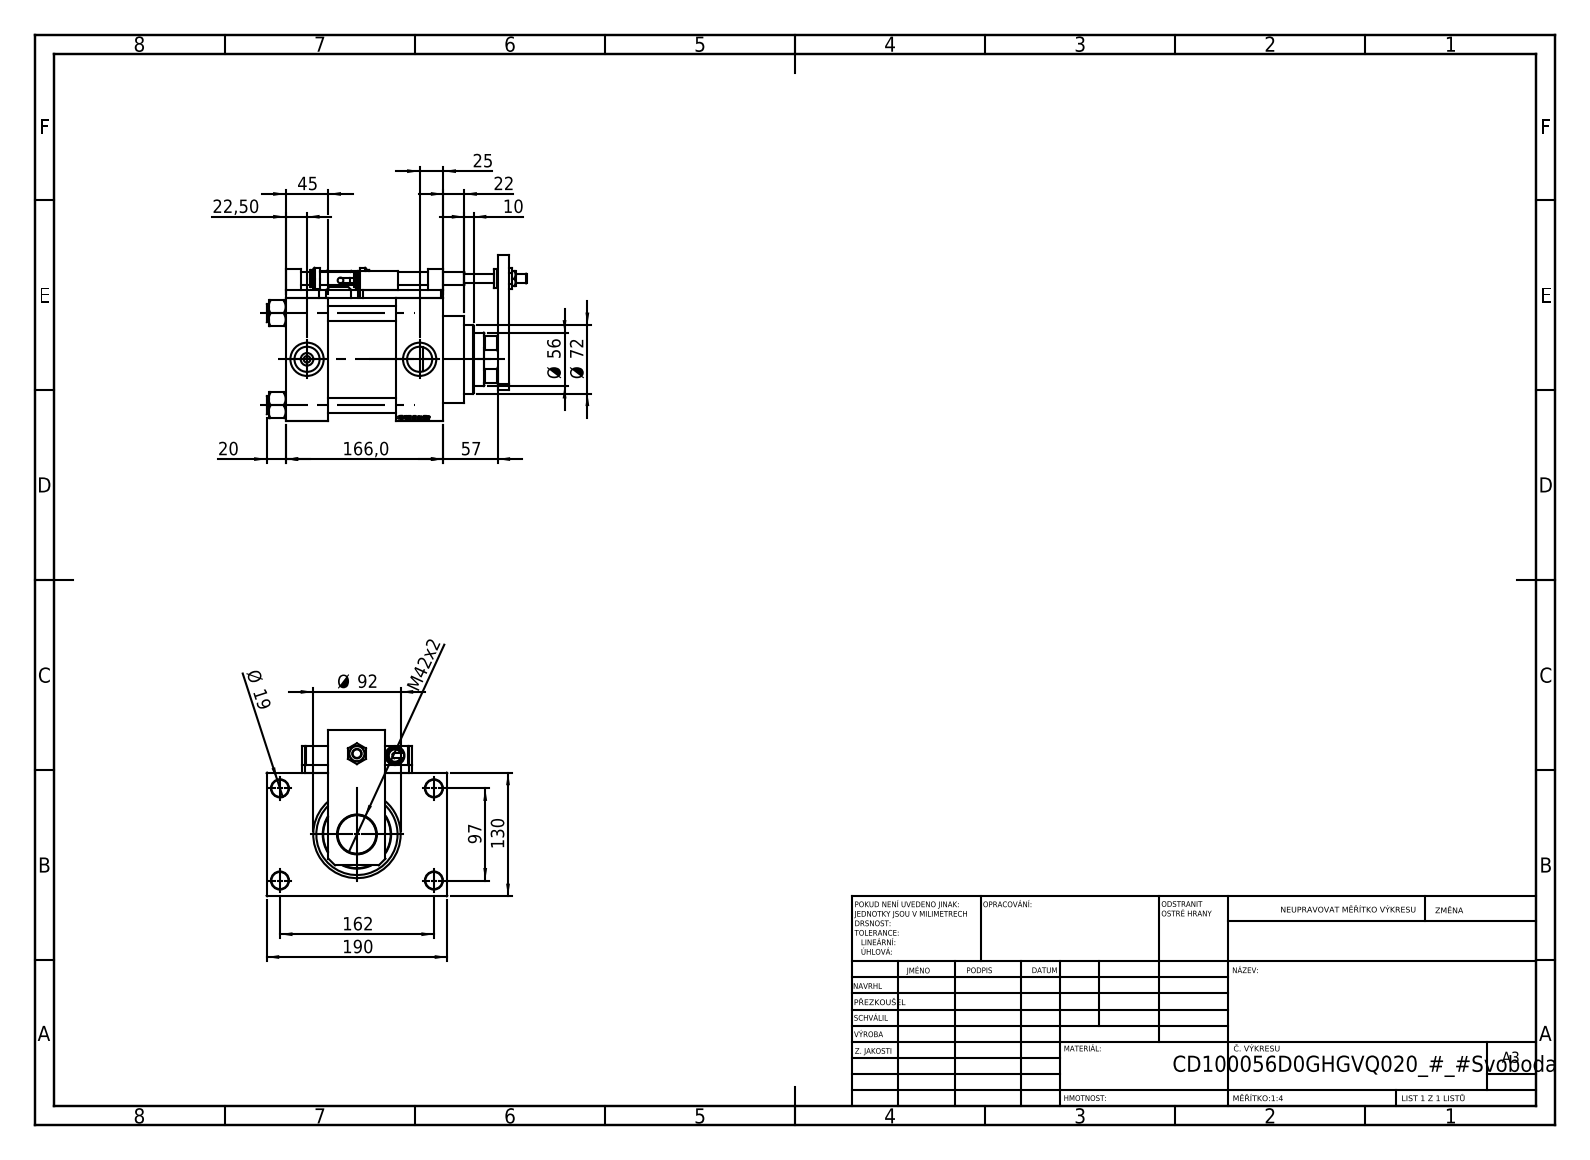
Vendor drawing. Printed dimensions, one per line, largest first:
190
166,0
162
130
97
Ø 92
Ø 72
57
Ø 56
45
M42x2
25
22,50
22
20
Ø 19
10
